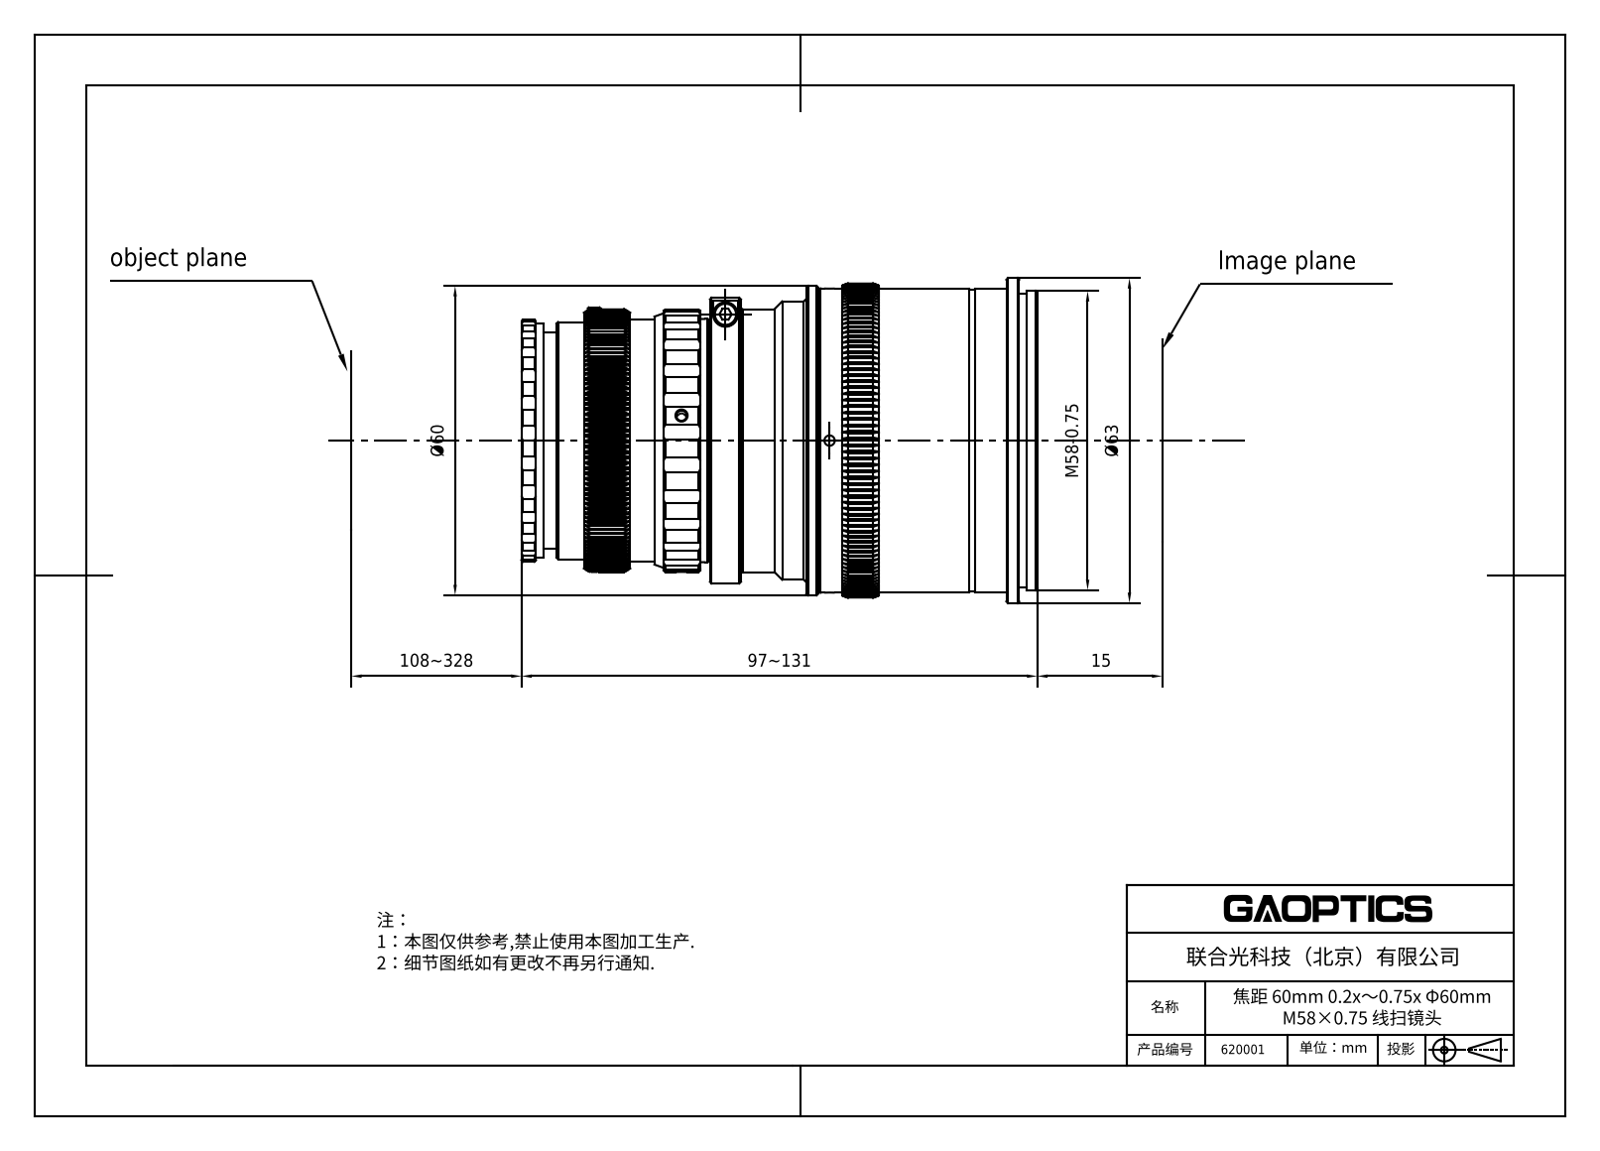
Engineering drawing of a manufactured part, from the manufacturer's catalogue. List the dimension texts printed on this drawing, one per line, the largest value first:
108~328
97~131
Ø63
Ø60
M58-0.75
15
